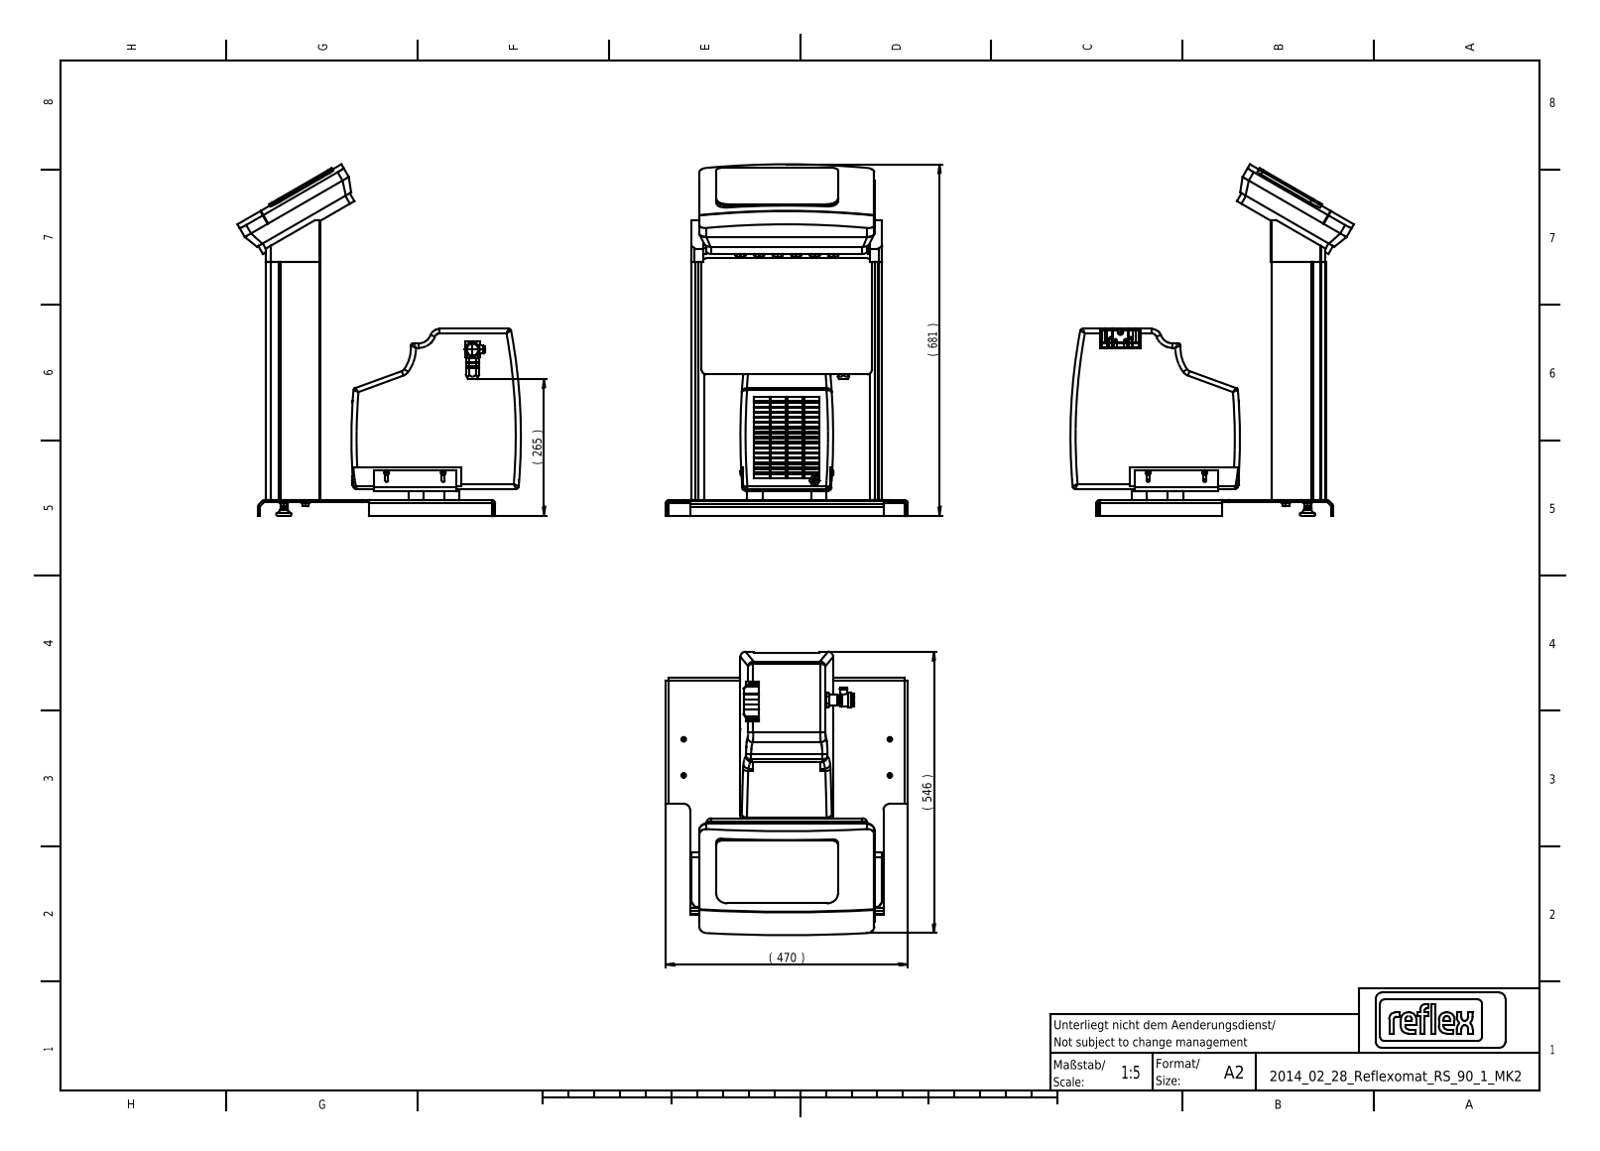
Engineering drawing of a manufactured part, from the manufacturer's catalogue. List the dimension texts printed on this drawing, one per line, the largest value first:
681 ( )
546 ( )
470 ( )
265 ( )
